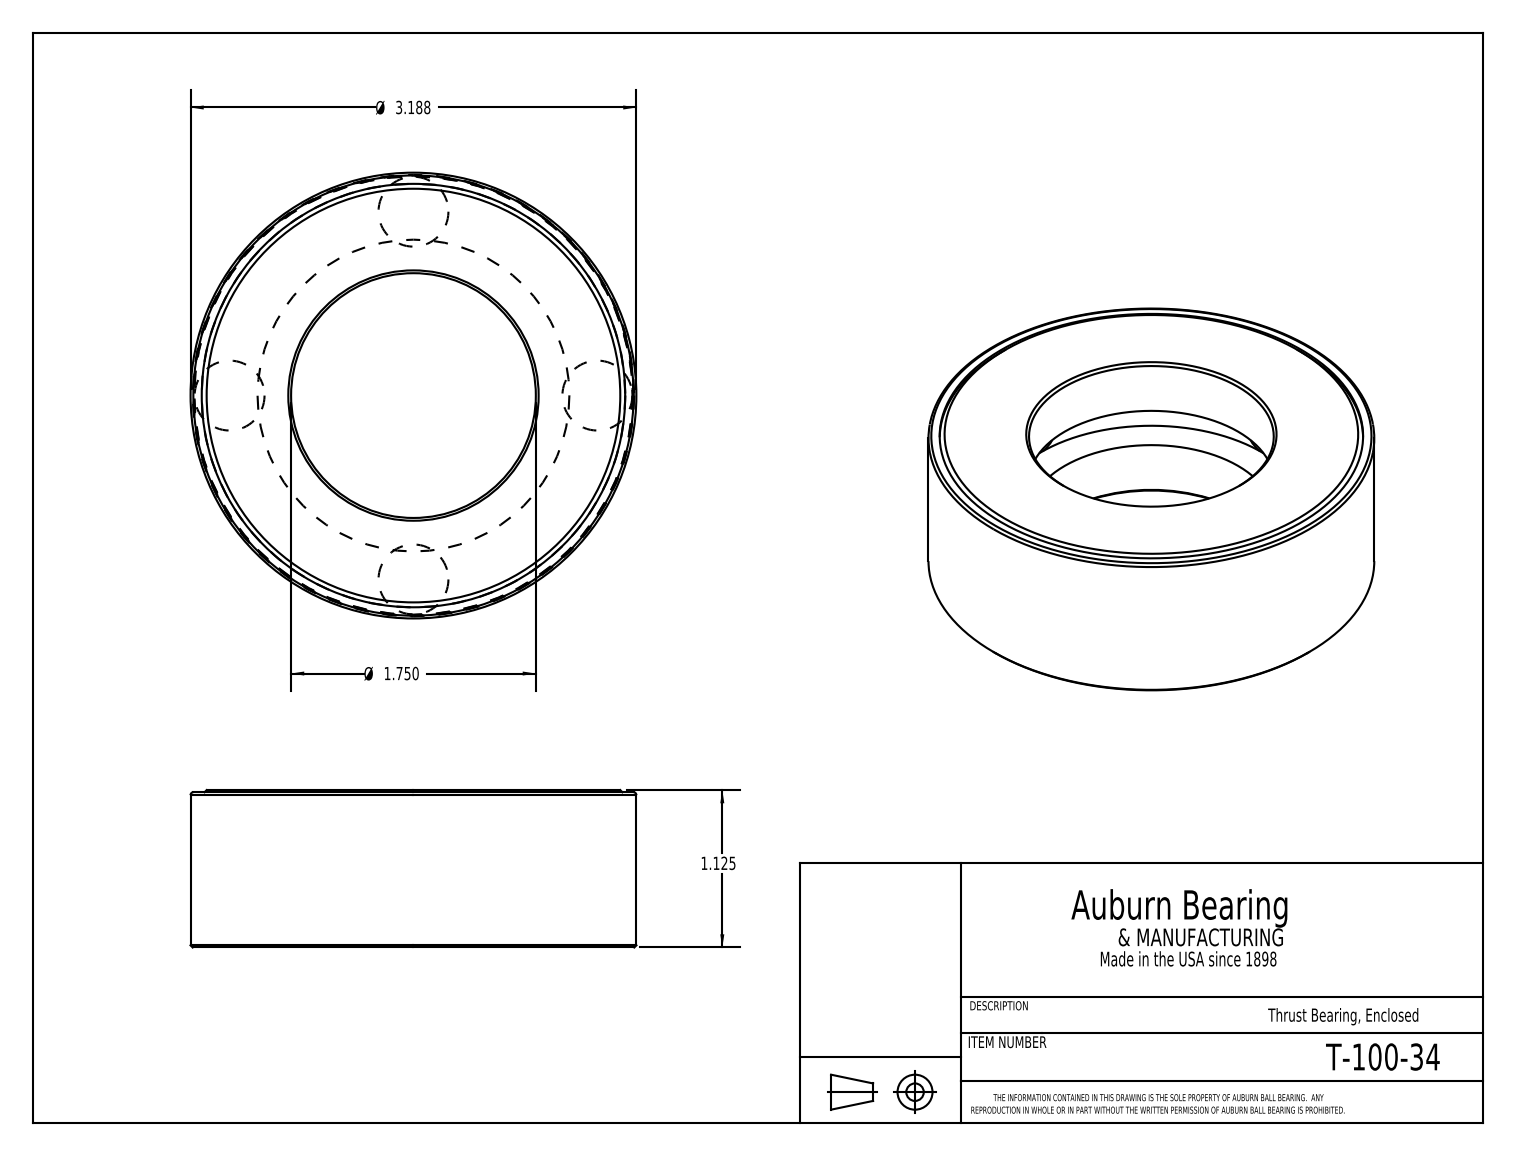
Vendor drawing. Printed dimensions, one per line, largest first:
Ø 3.188
Ø 1.750
1.125
